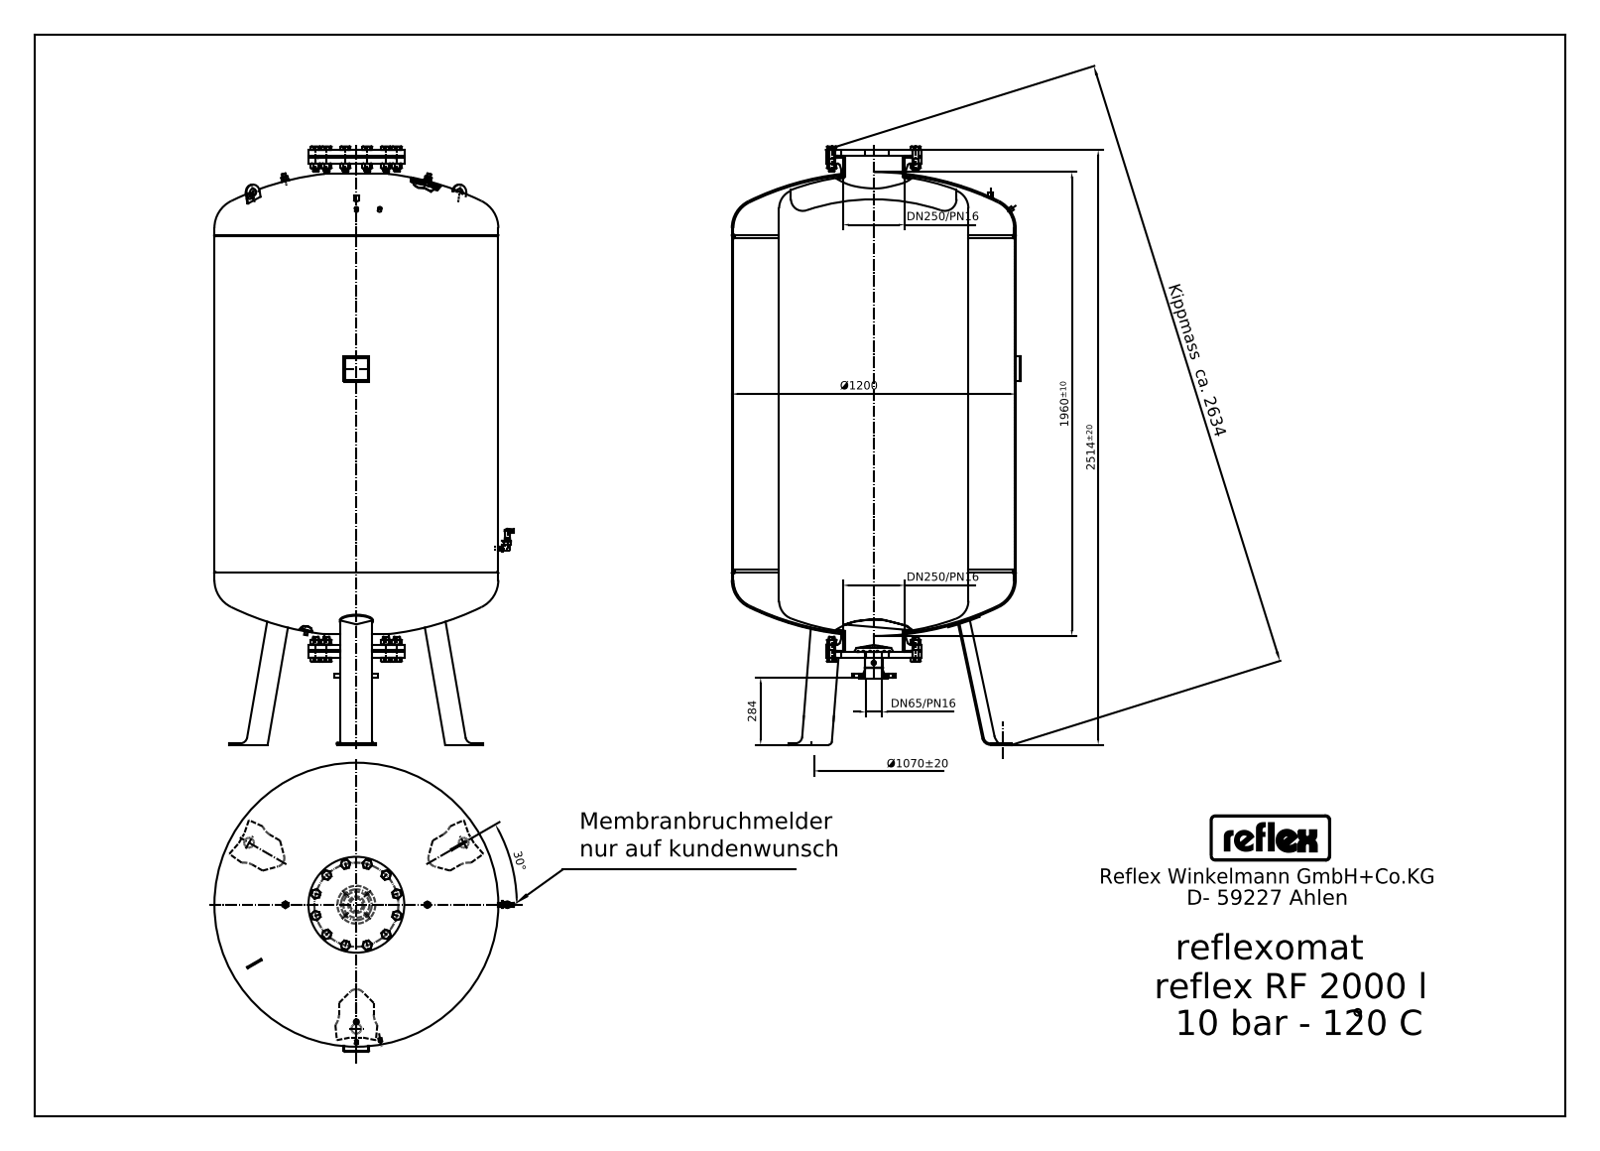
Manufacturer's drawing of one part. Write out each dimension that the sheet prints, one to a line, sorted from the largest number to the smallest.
Kippmass ca. 2634
2514±20
1960±10
Ø1200
Ø1070±20
284
DN250/PN16
DN250/PN16
DN65/PN16
30°
